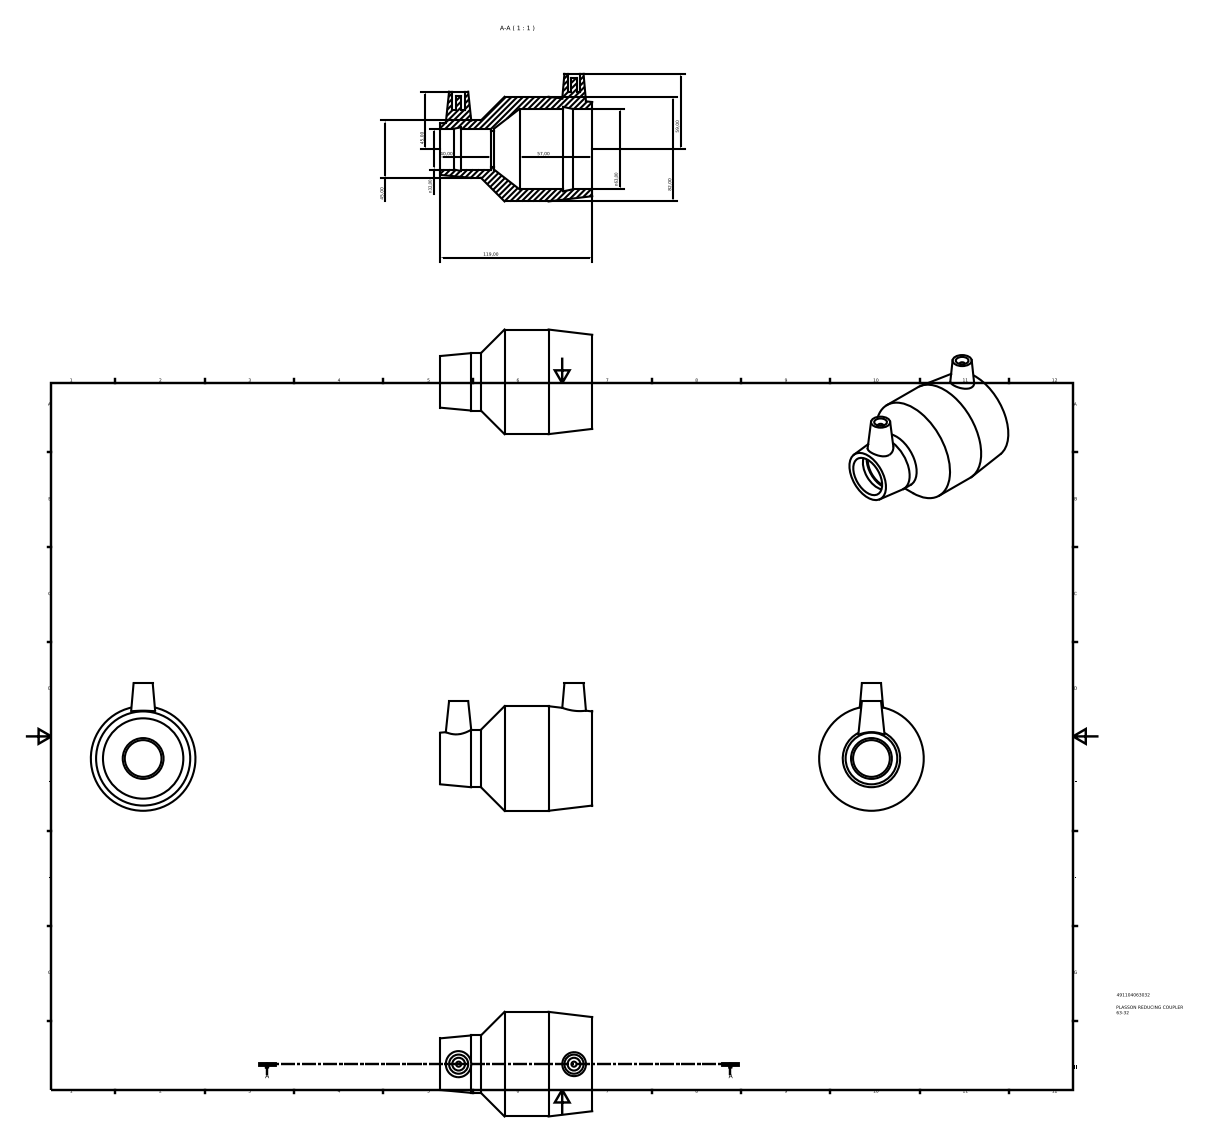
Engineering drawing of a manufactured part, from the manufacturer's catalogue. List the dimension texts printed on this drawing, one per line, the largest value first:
119,00
82,00
n63,00
59,00
57,00
45,00
45,00
40,00
n32,00
